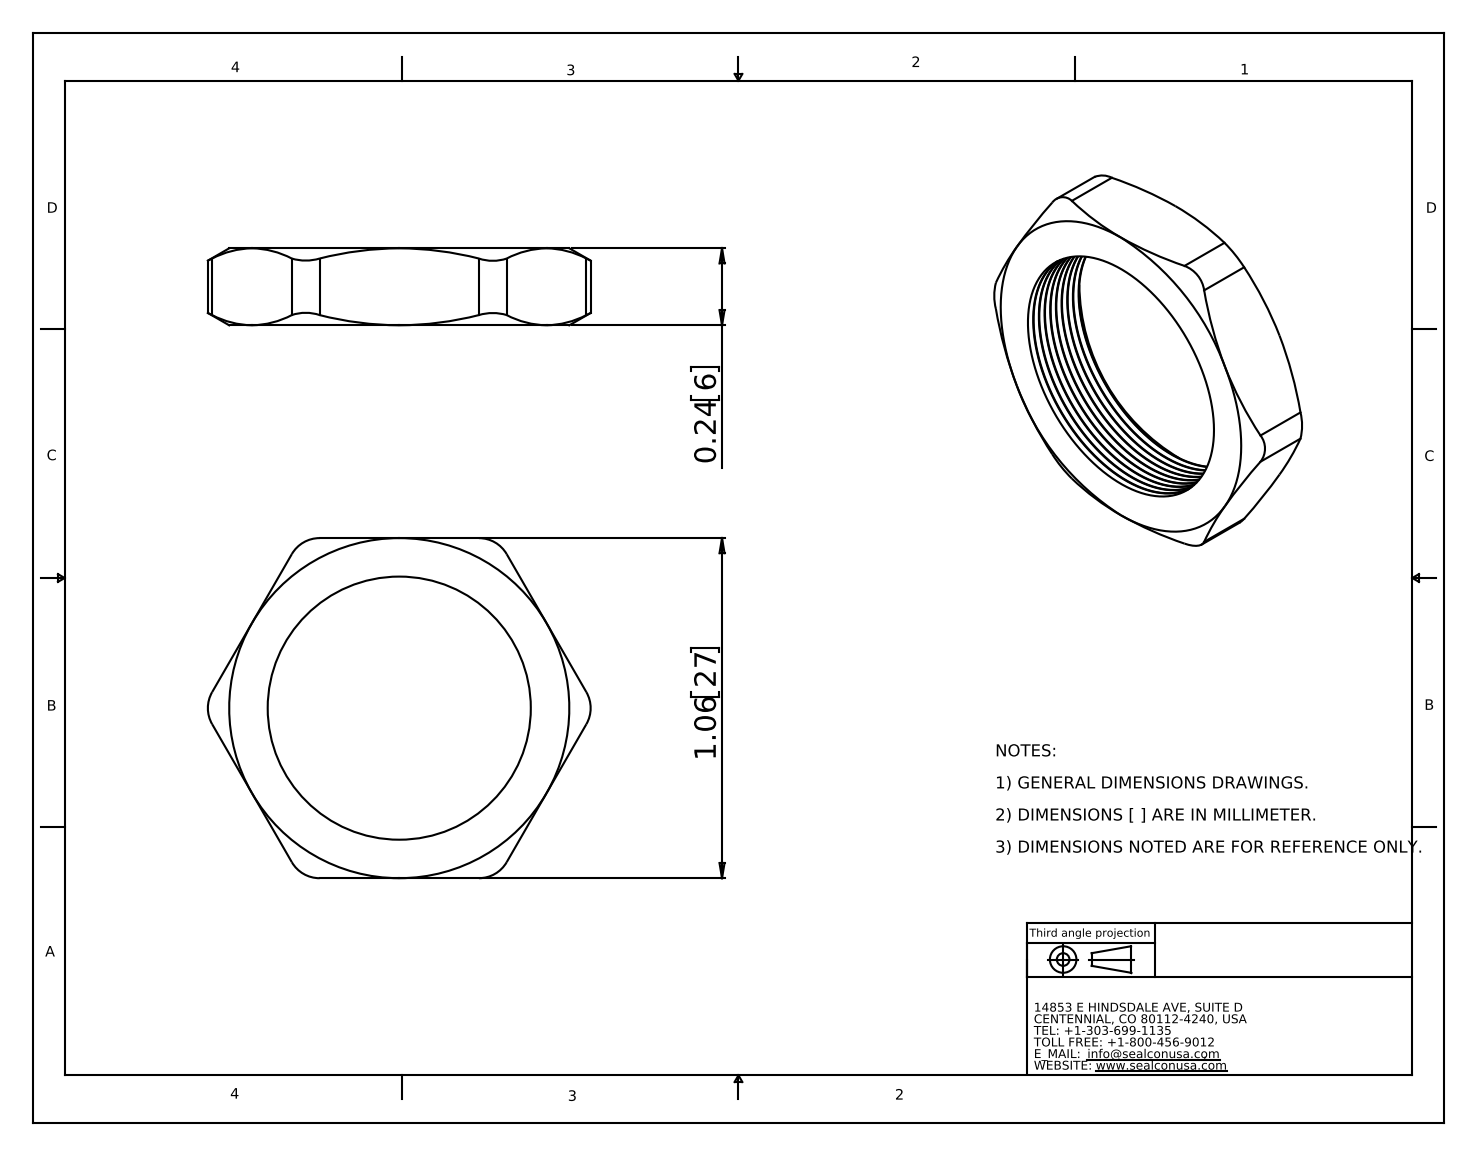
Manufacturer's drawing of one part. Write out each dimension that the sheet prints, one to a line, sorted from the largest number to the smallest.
1.06 27
0.24 6
